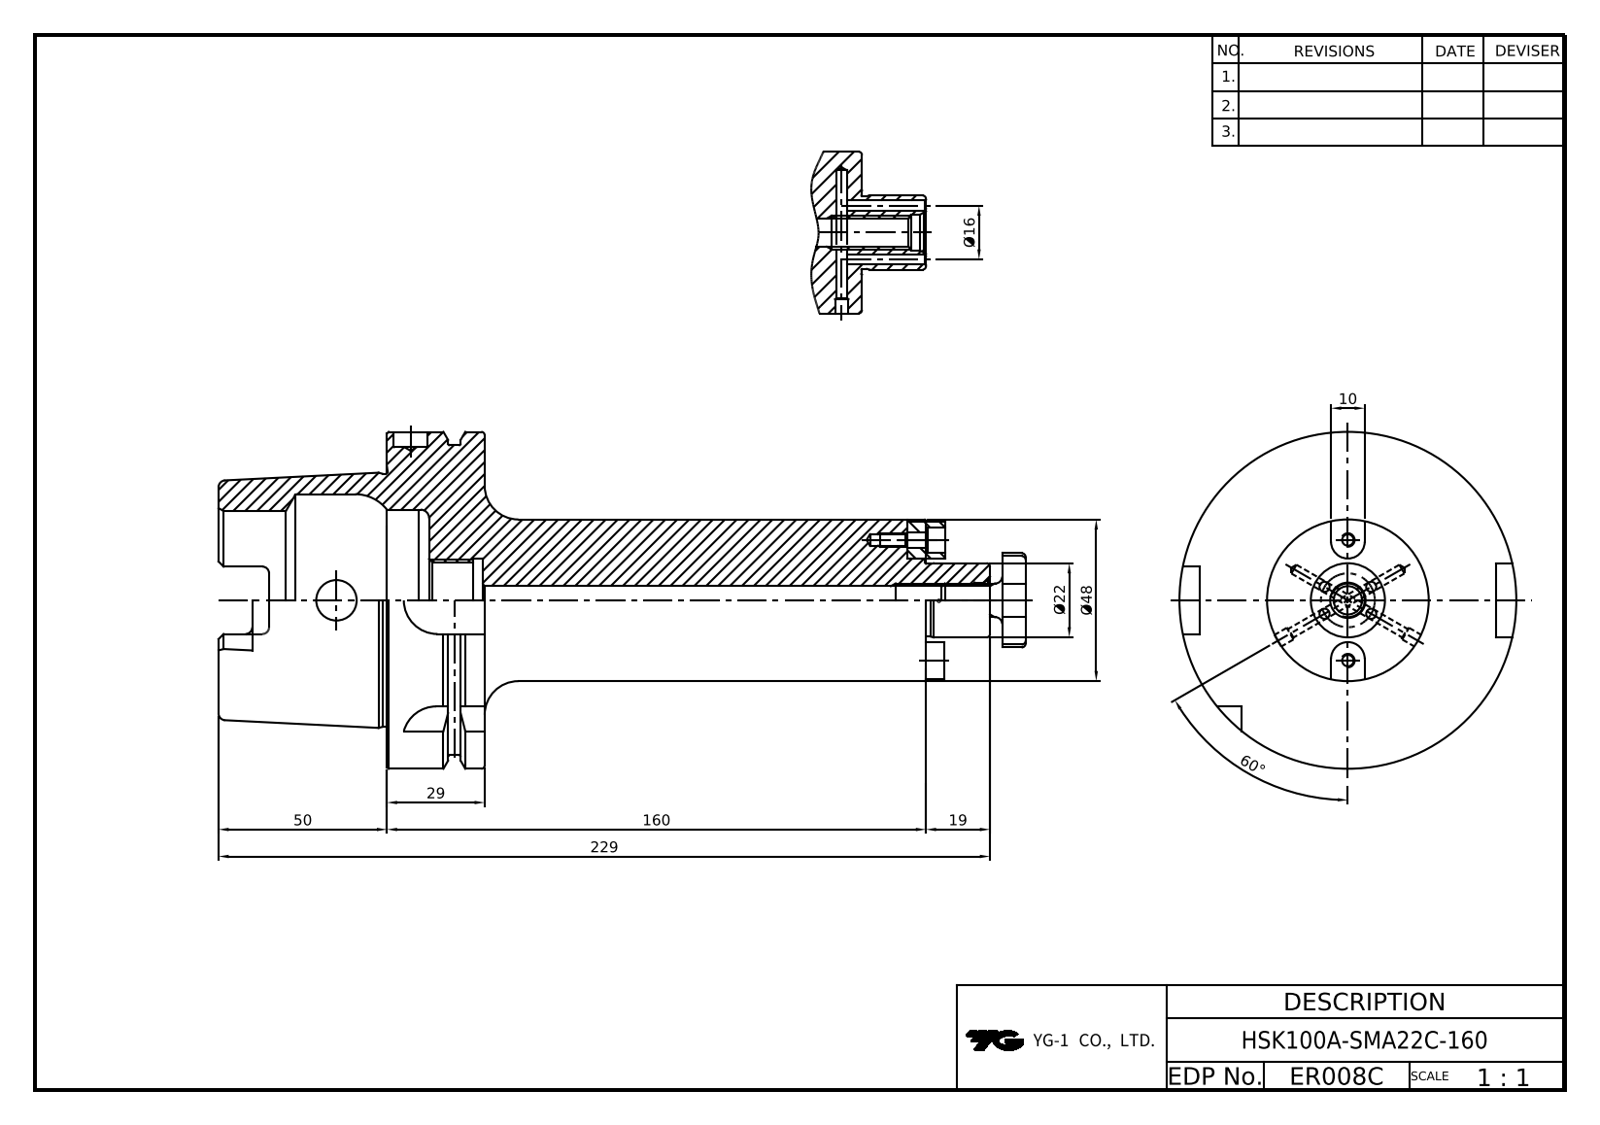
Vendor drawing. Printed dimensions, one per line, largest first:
229
160
60°
50
Ø48
29
Ø22
19
Ø16
10
